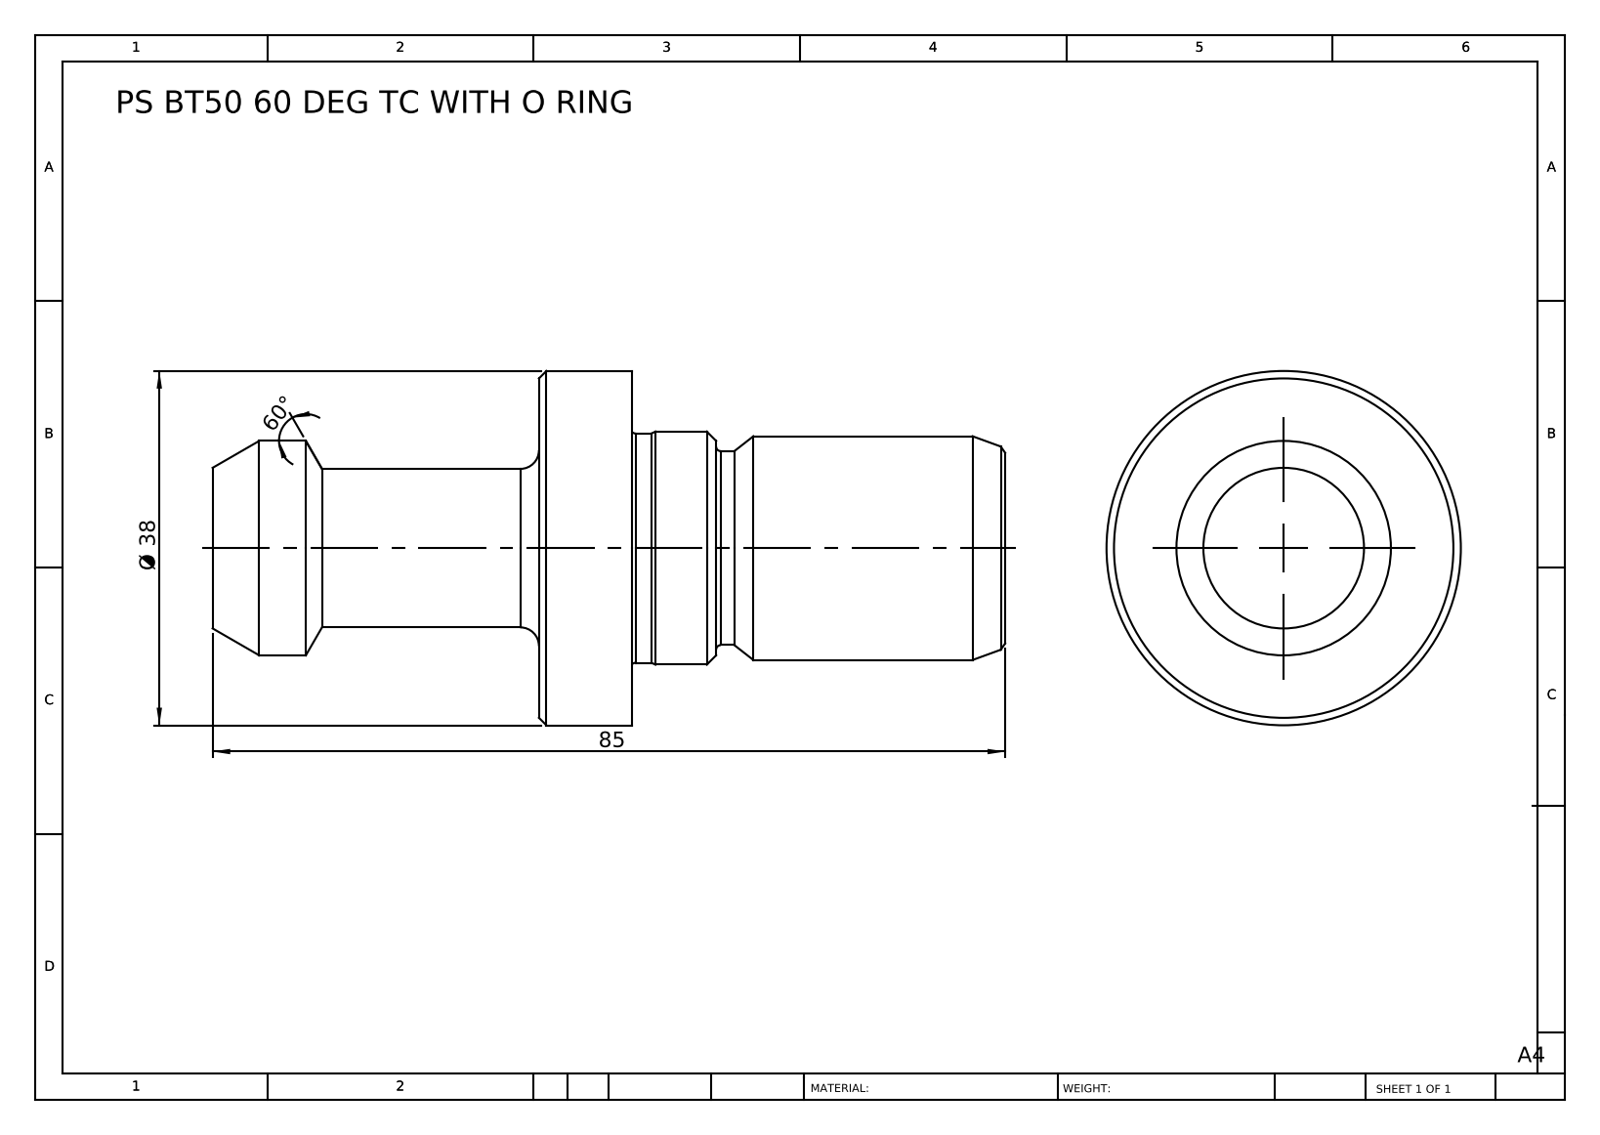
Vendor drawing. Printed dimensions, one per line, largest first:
85
60°
Ø 38
